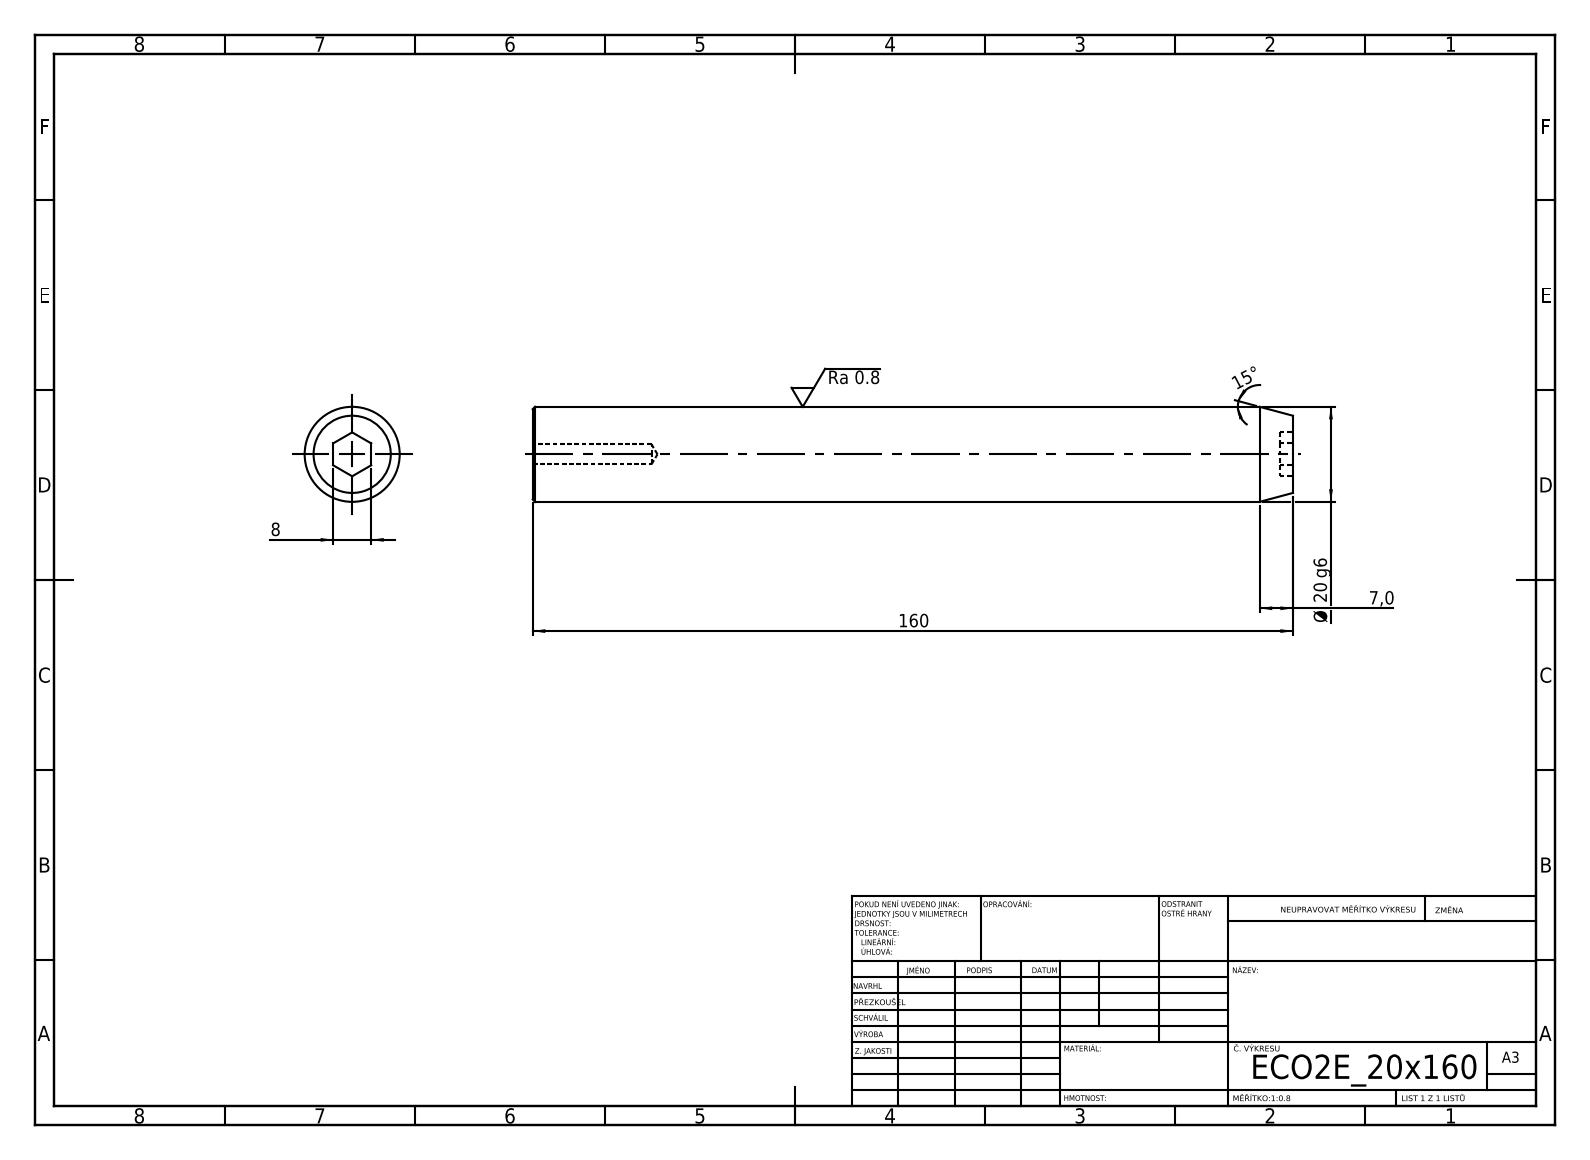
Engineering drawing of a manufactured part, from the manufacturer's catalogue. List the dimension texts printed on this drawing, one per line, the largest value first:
160
Ø 20 g6
15°
8
7,0
